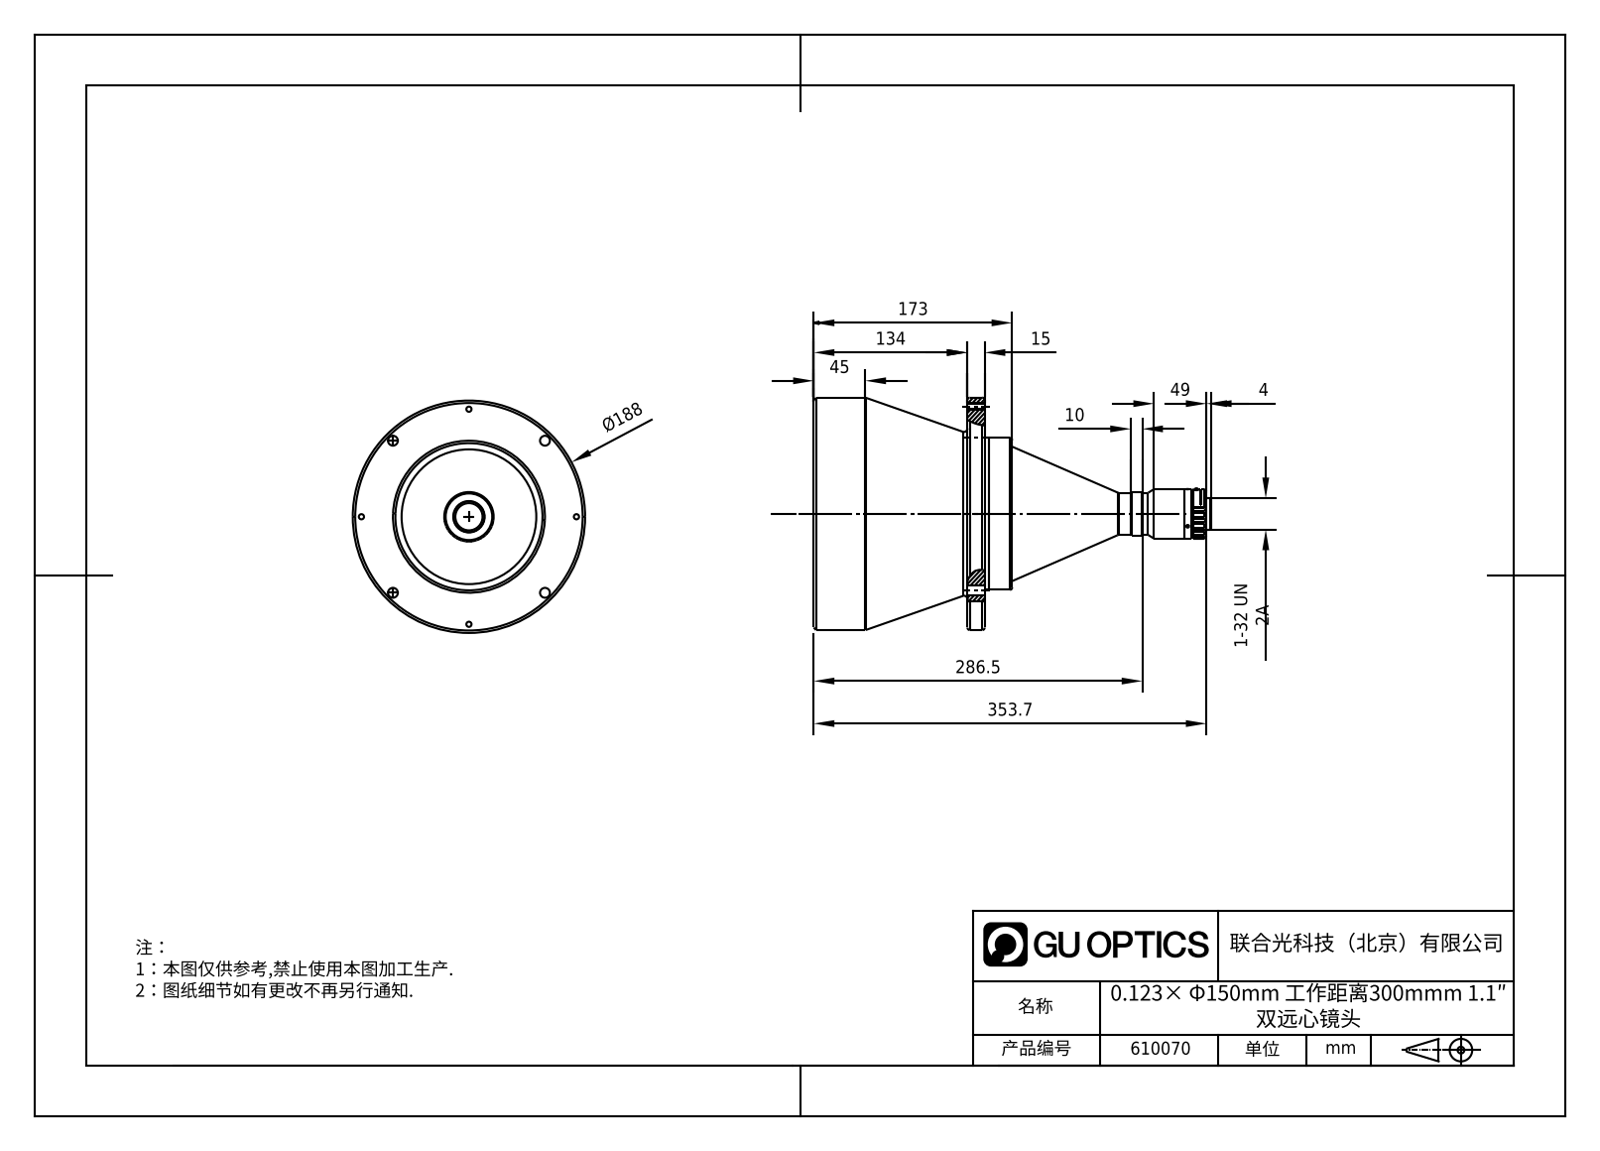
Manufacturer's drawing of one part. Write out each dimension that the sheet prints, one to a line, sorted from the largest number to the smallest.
353.7
286.5
Ø188
173
134
49
45
15
10
4
1-32 UN 2A
